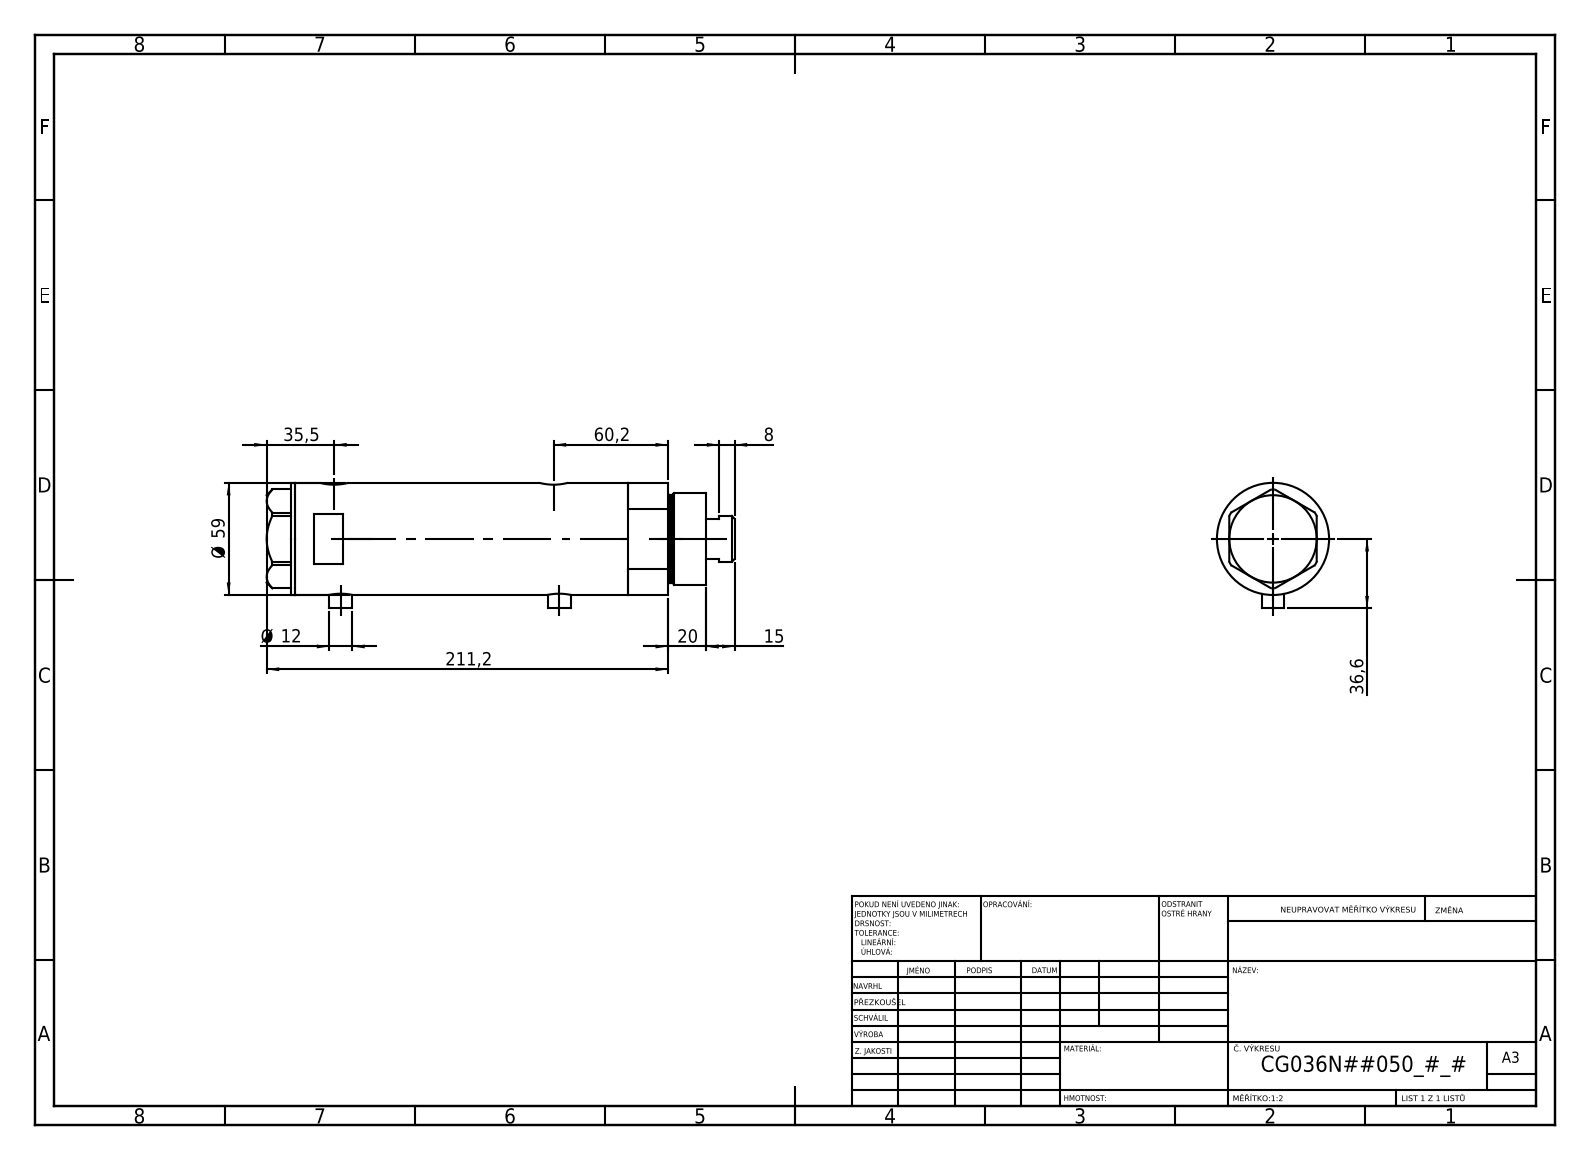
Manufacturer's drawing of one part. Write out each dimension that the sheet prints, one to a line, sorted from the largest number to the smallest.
211,2
60,2
Ø 59
36,6
35,5
20
15
Ø 12
8
